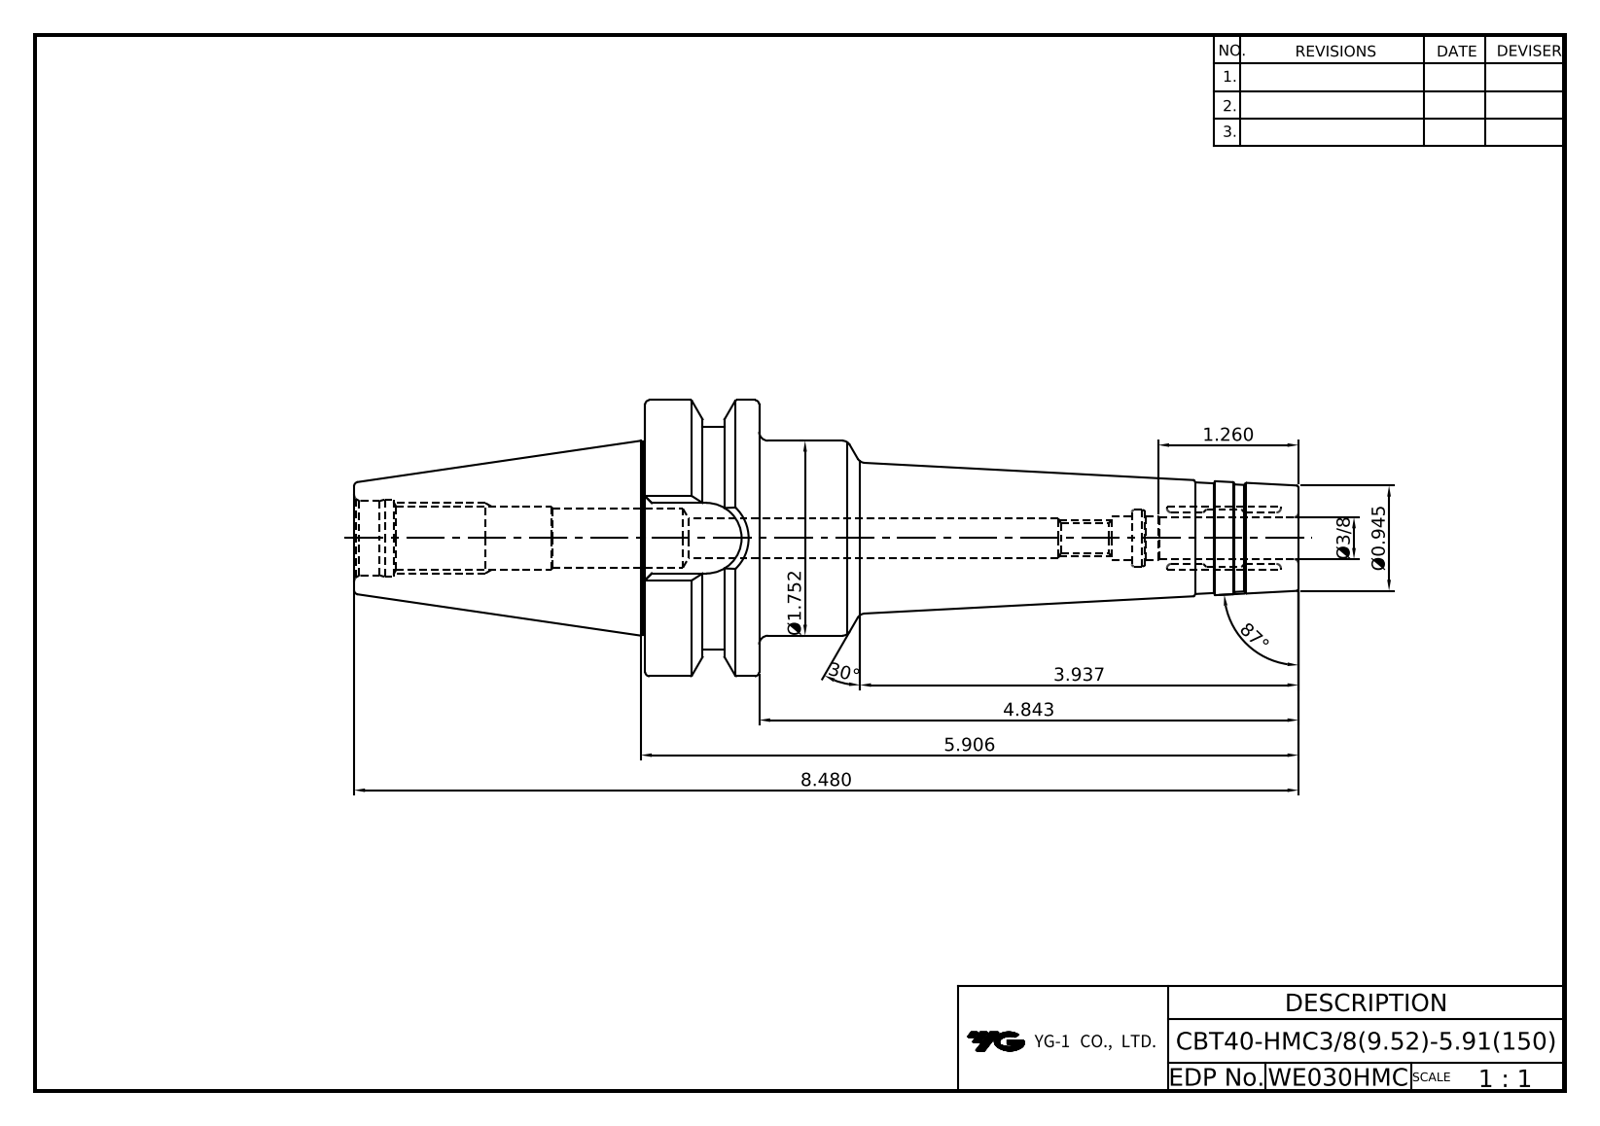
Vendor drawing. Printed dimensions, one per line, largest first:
87°
30°
8.480
5.906
4.843
3.937
Ø1.752
1.260
Ø0.945
Ø3/8
